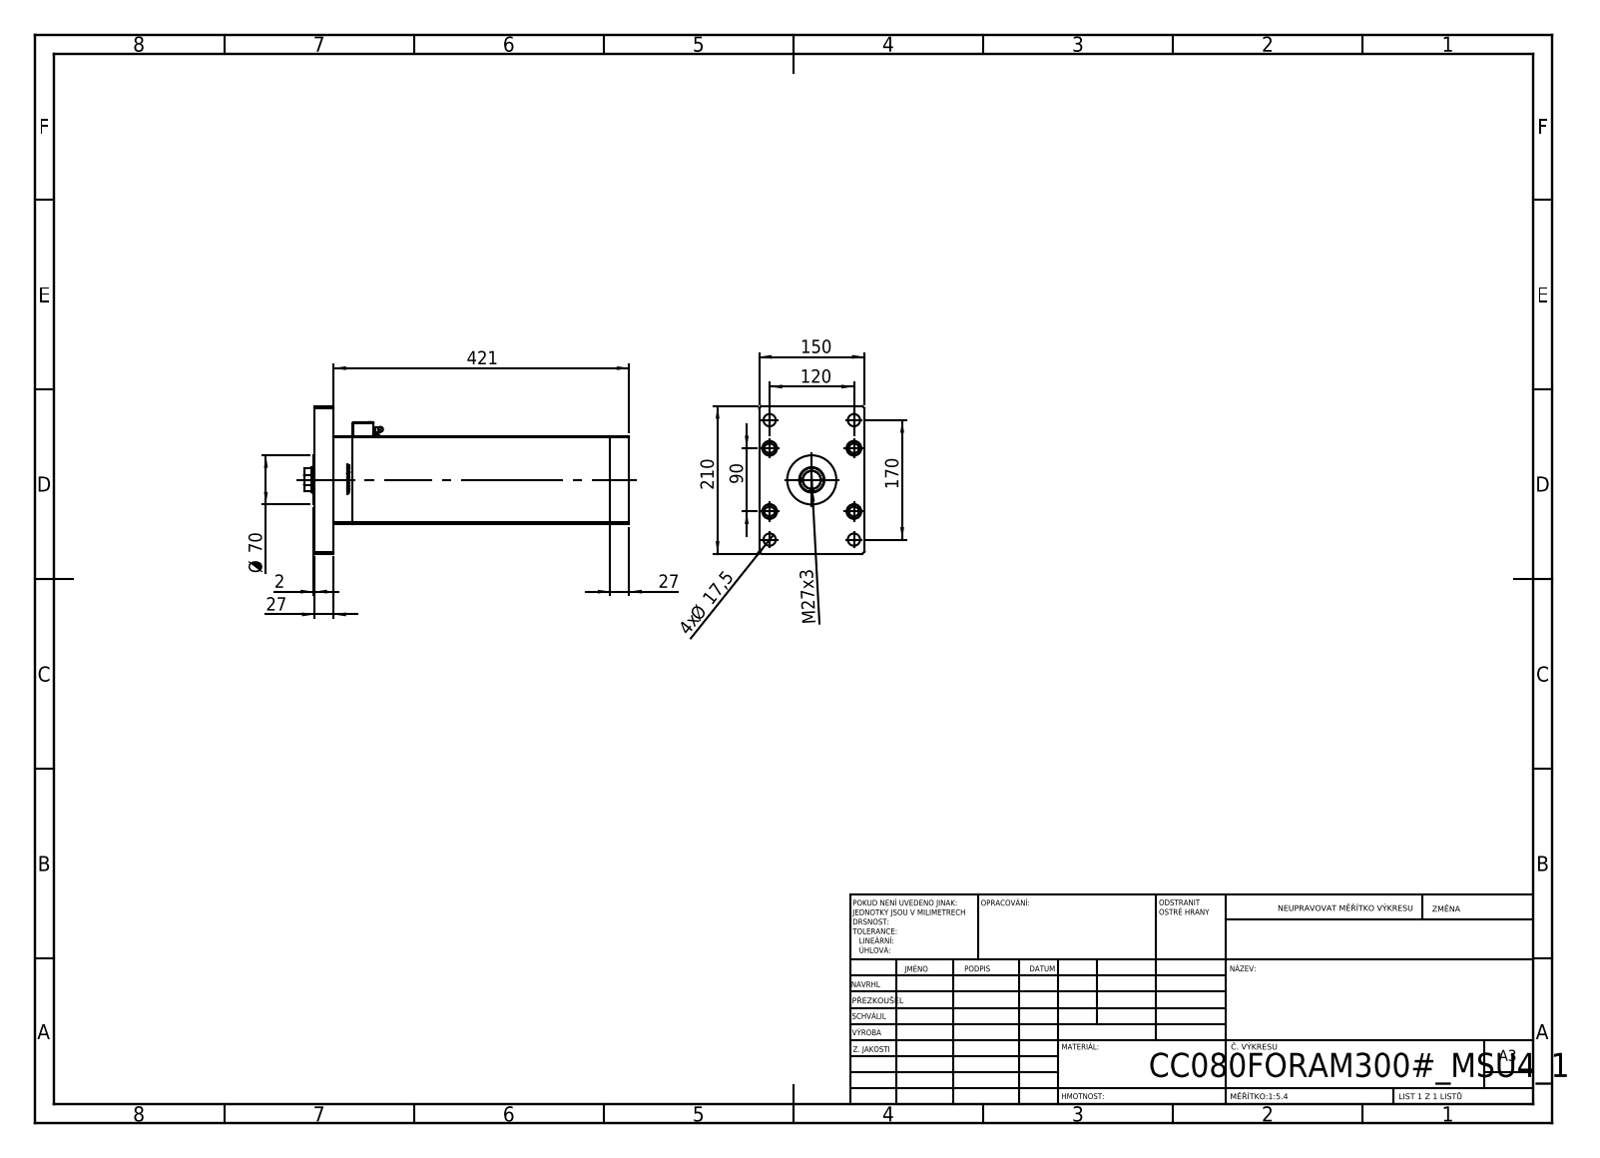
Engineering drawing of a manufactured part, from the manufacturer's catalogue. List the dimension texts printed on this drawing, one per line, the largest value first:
421
210
170
150
120
90
Ø 70
27
27
M27x3
4x Ø 17,5
2
